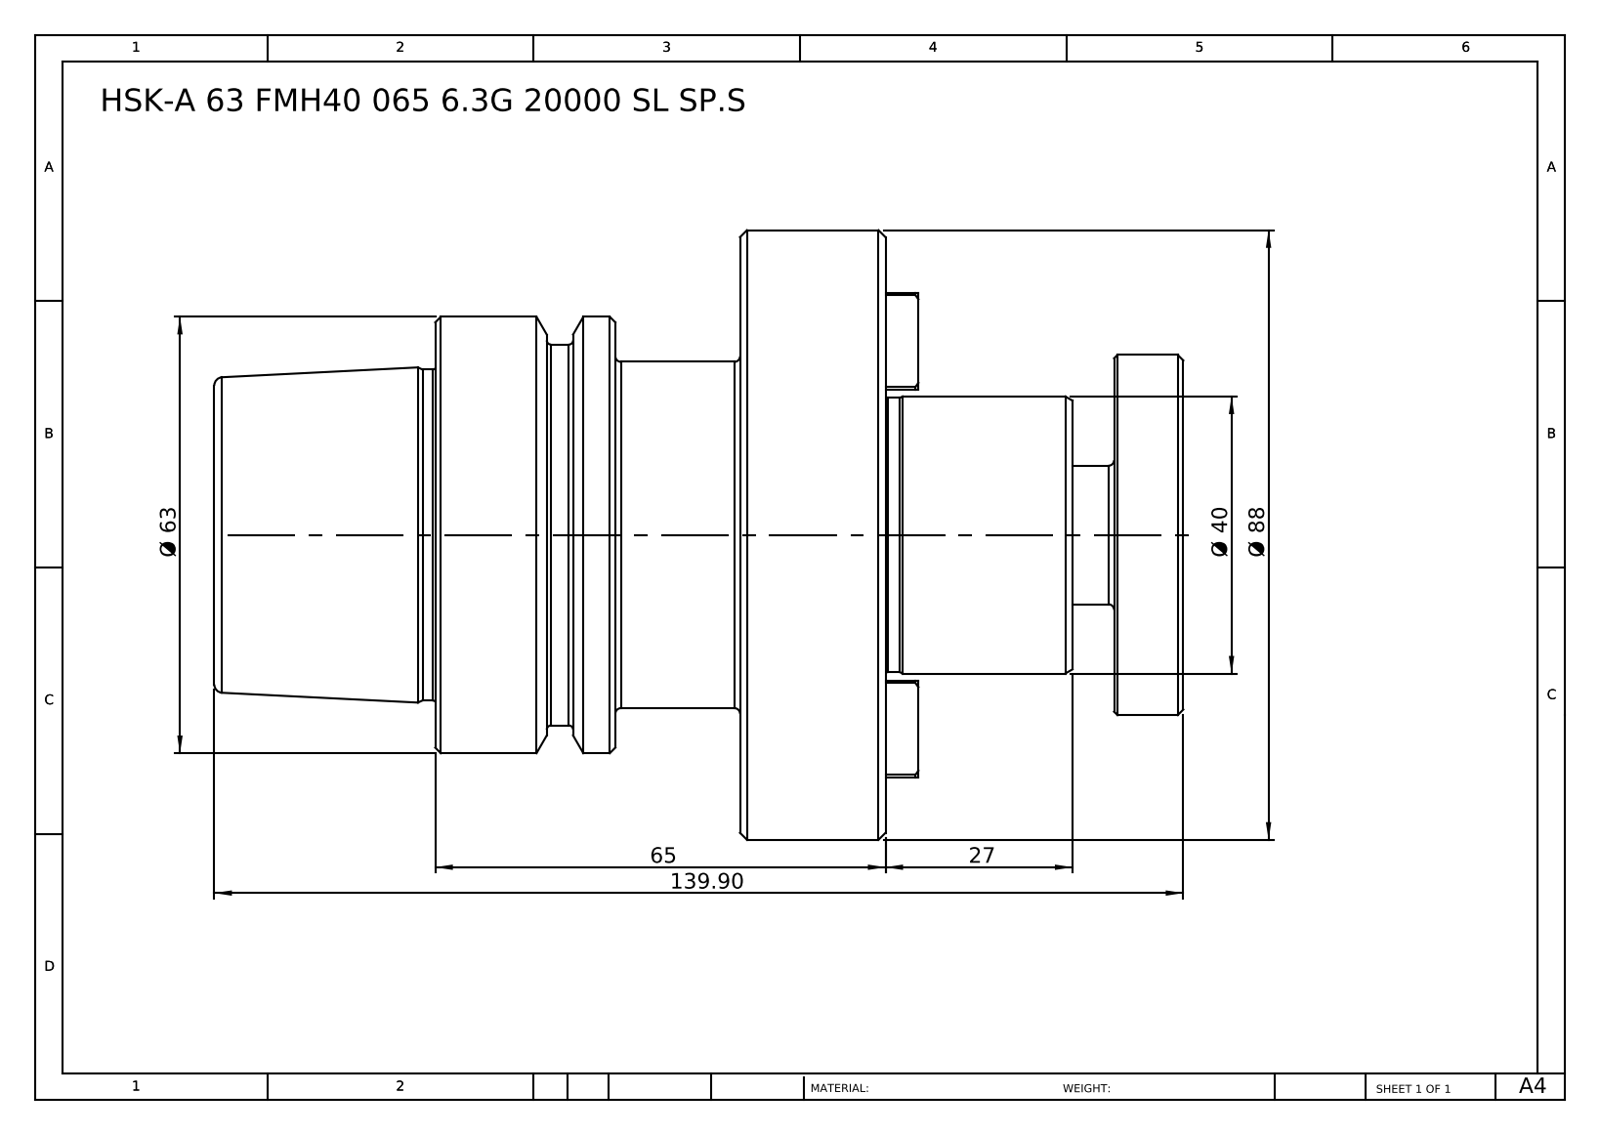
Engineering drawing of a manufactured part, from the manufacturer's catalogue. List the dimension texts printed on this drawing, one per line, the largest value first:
139.90
Ø 88
65
Ø 63
Ø 40
27
